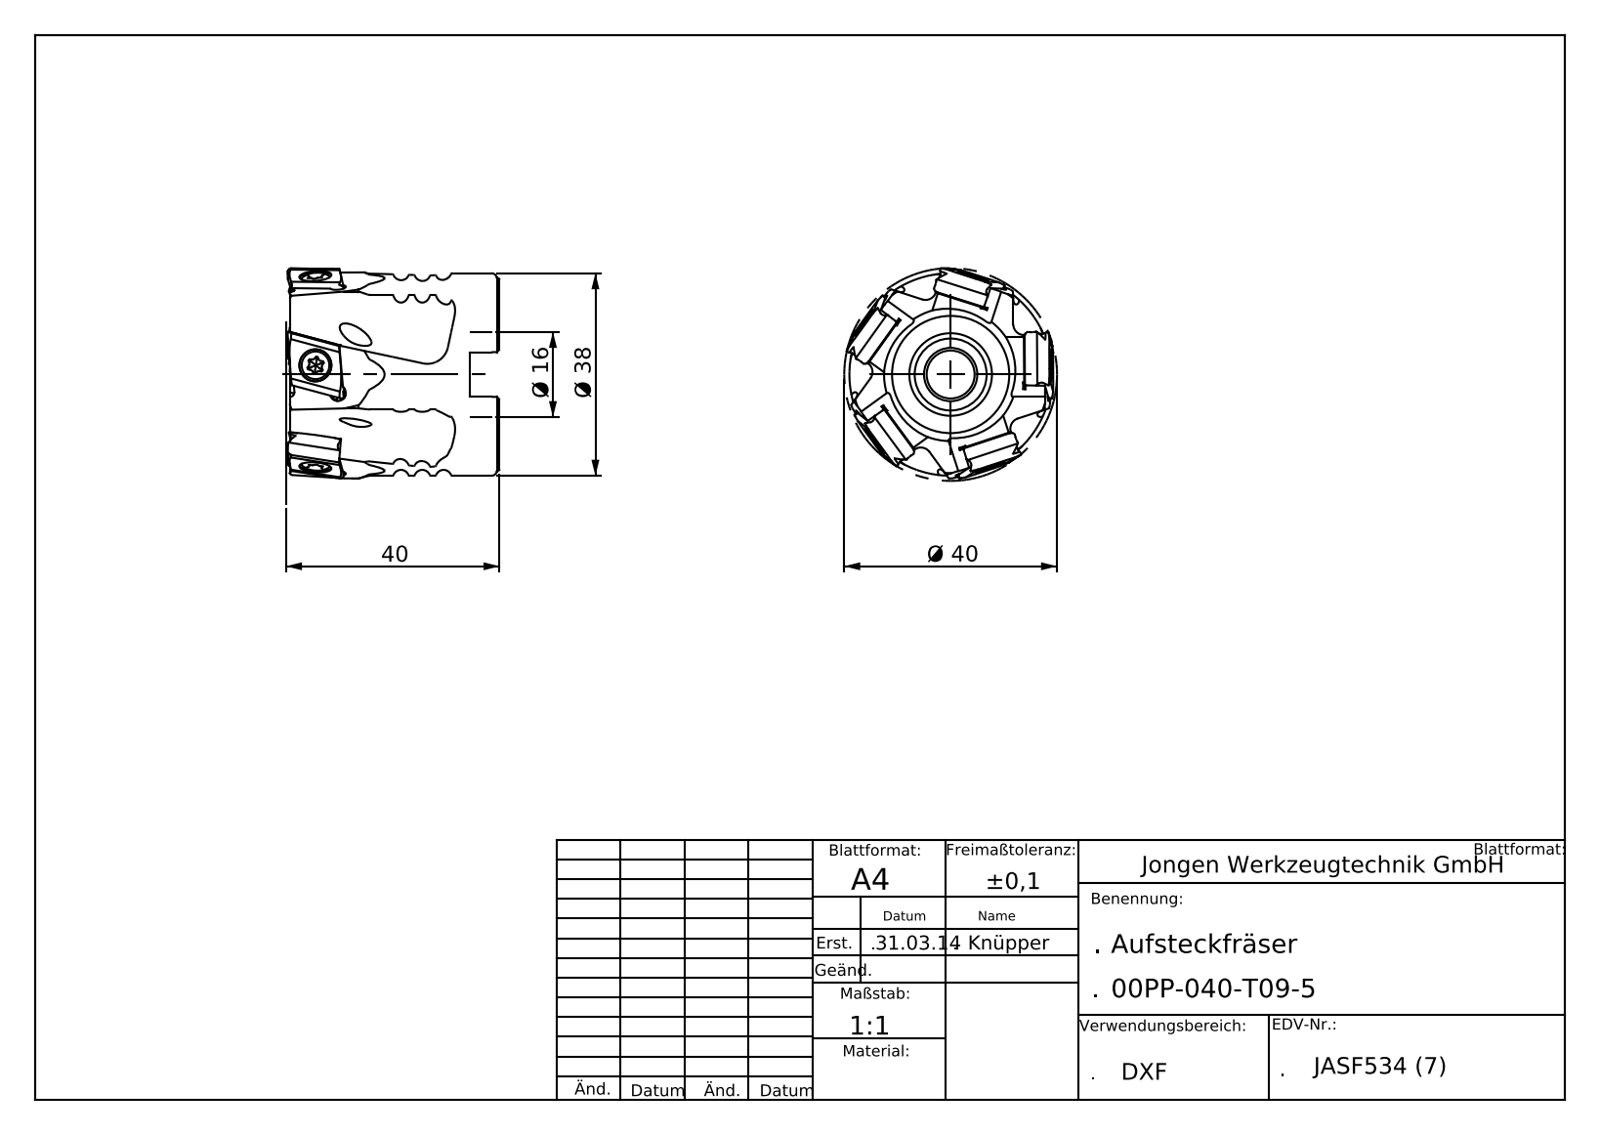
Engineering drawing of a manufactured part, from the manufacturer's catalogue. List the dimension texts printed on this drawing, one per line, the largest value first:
40
Ø 40
Ø 38
Ø 16
